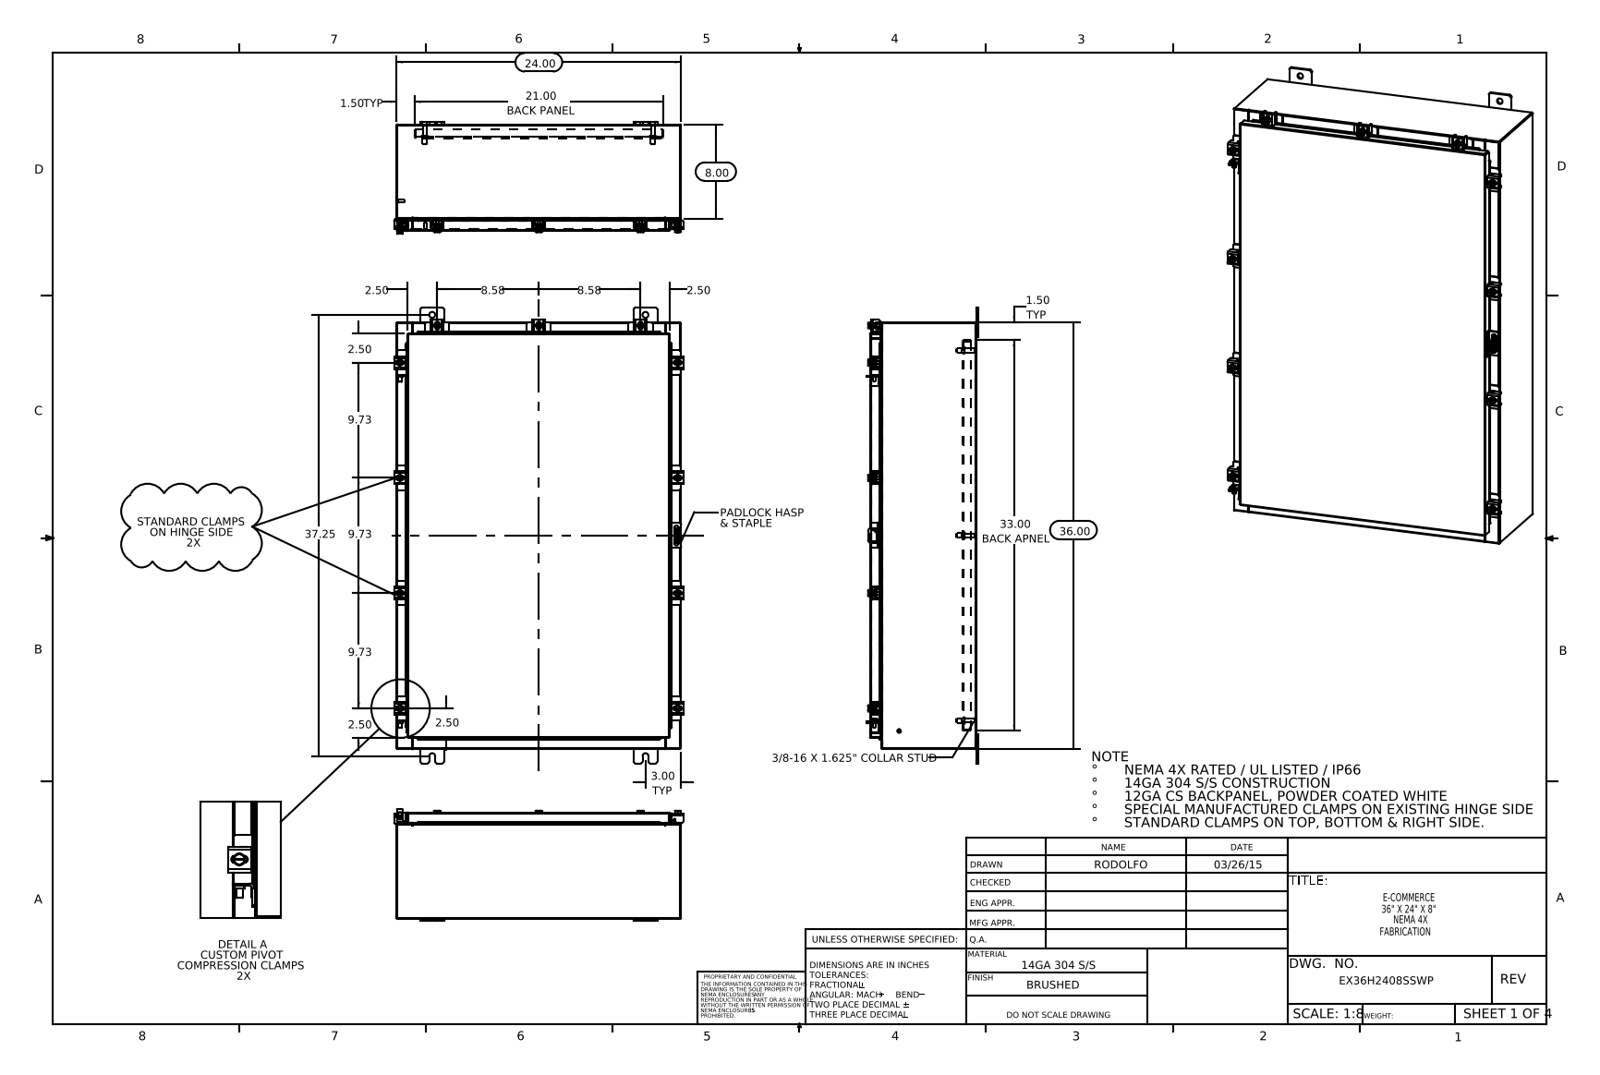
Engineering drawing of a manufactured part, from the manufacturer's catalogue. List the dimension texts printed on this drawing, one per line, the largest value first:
37.25
36.00
33.00 BACK APNEL
24.00
21.00 BACK PANEL
9.73
9.73
9.73
8.58
8.58
8.00
3.00 TYP
2.50
2.50
2.50
2.50
2.50
1.50 TYP
1.50 TYP
